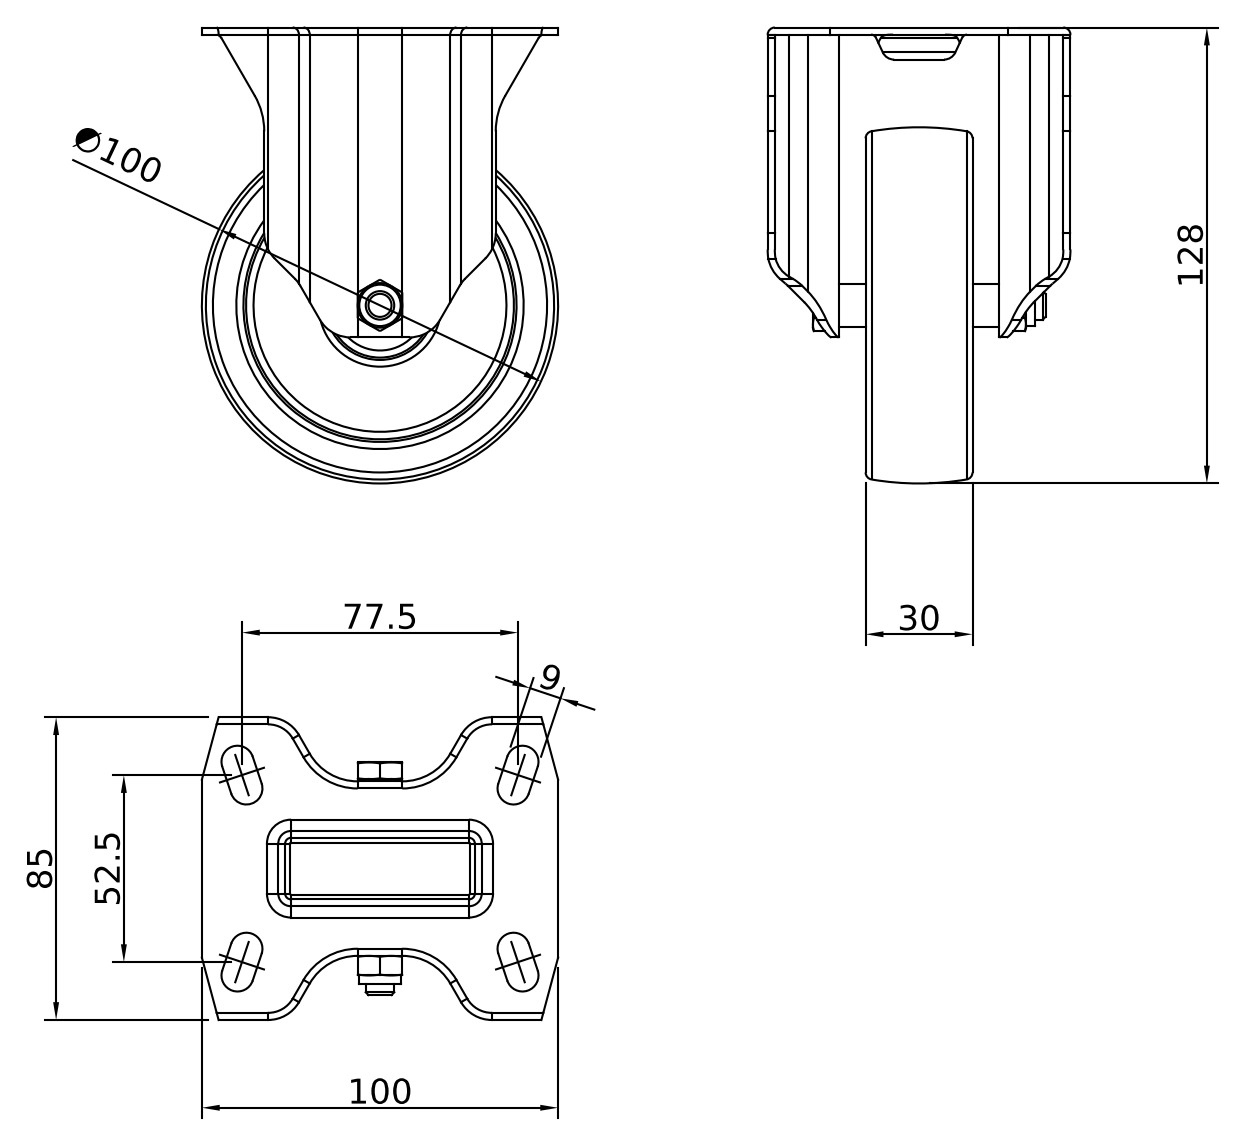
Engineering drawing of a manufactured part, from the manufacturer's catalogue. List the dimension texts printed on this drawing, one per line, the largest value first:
128
100
∅100
85
77.5
52.5
30
9
